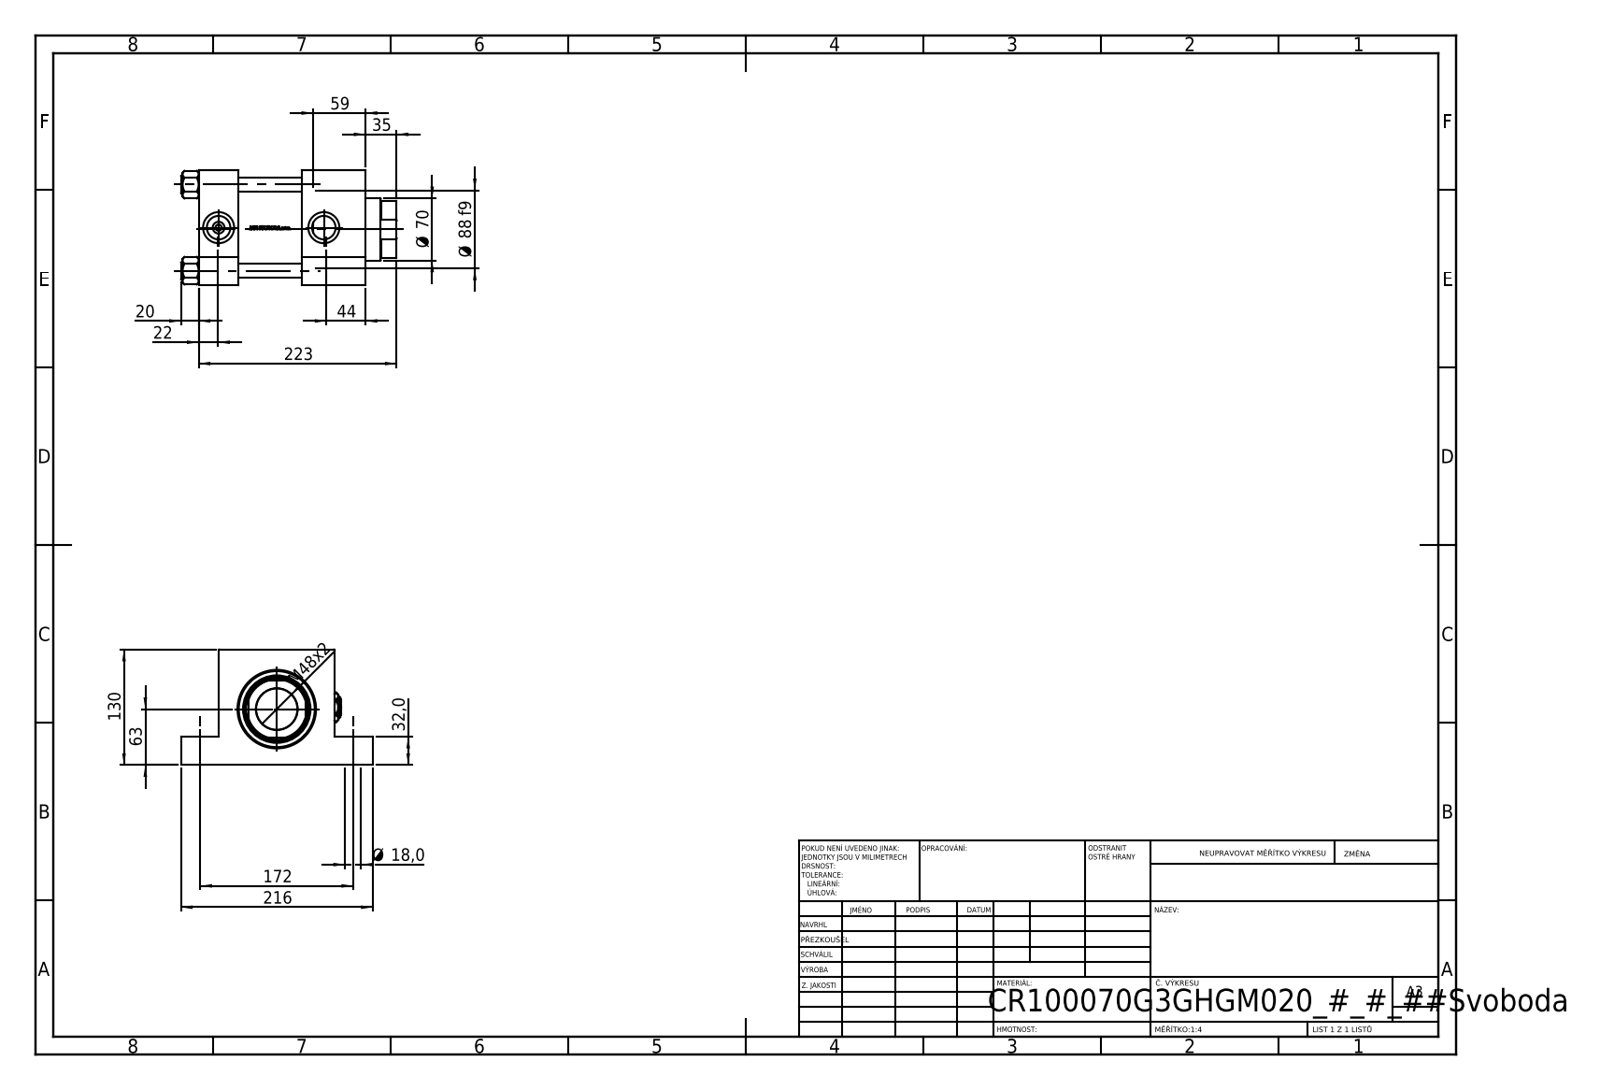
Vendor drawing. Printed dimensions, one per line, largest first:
223
216
172
130
Ø 88 f9
Ø 70
63
59
M48x2
44
35
32,0
22
20
Ø 18,0
